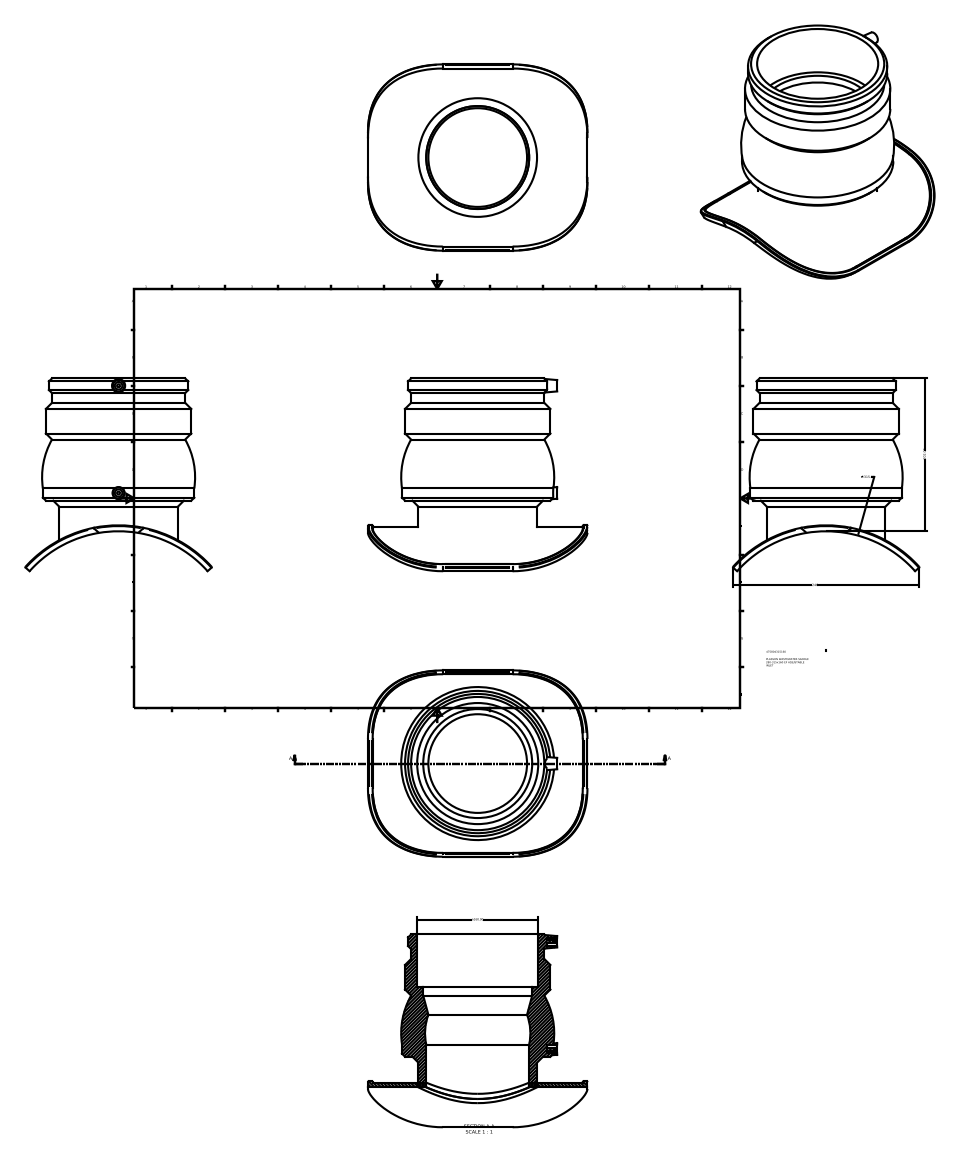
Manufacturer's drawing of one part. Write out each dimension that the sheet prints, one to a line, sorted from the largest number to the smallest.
∅315.0
246
202.00
n160.00
